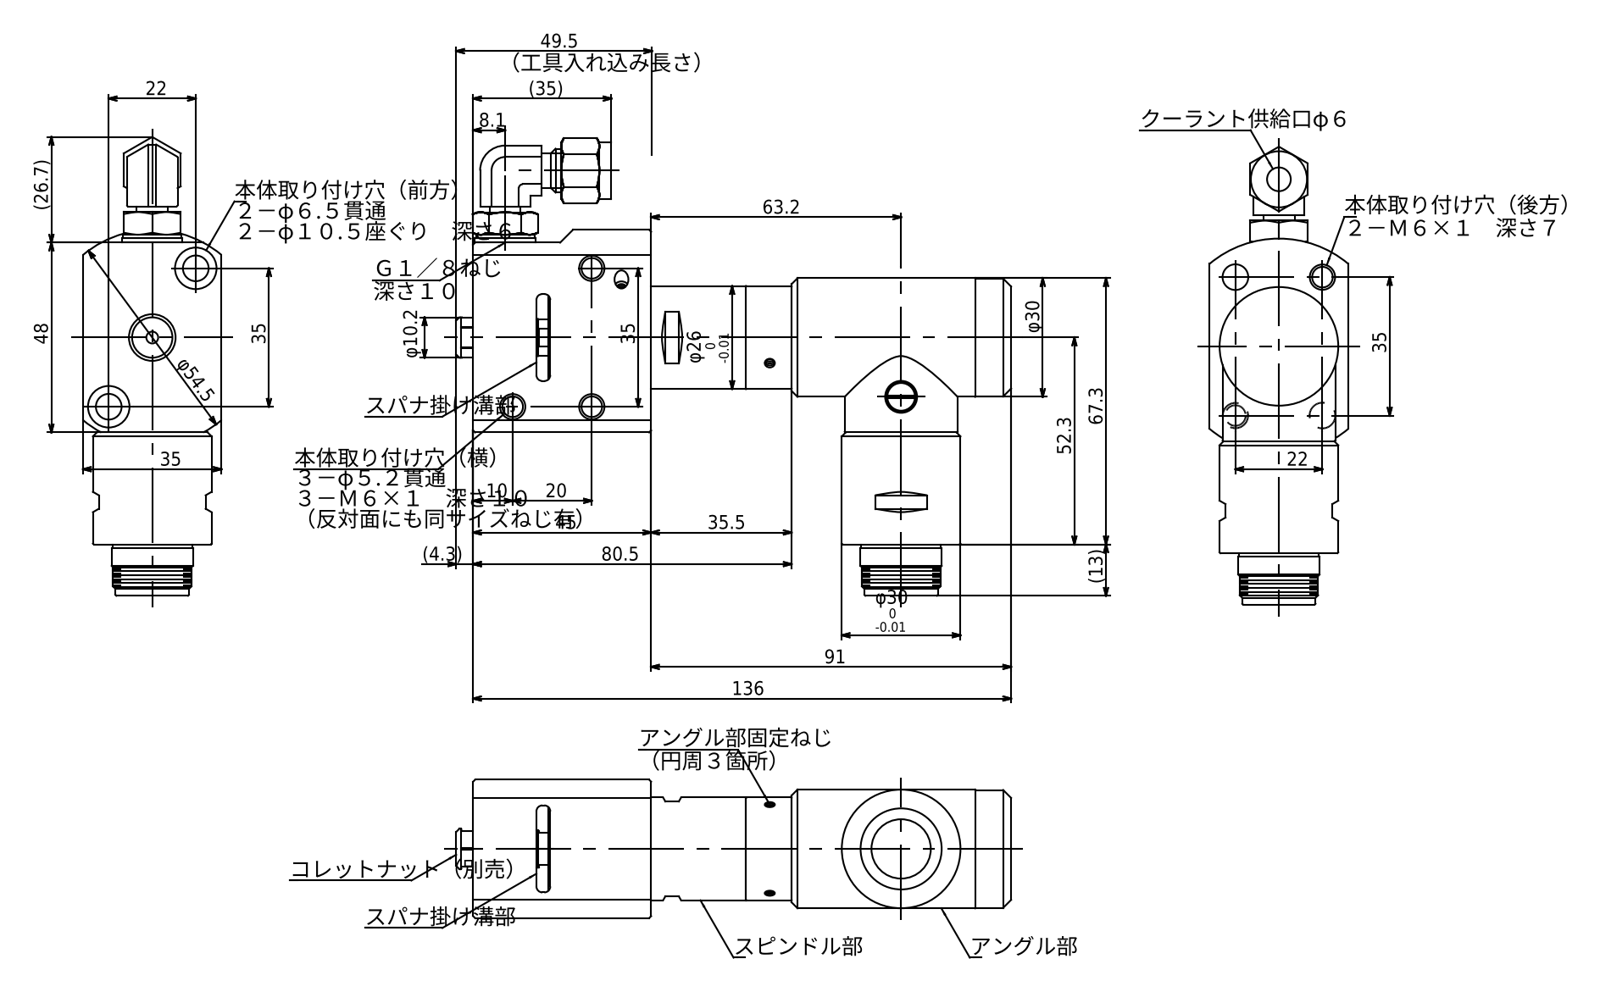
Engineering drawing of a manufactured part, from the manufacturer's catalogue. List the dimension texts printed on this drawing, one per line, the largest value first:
136
91
80.5
67.3
63.2
φ54.5
52.3
49.5
48
45
35.5
35
(35)
35
35
35
φ30
φ30
(26.7)
φ26
22
22
20
(13)
φ10.2
10
8.1
(4.3)
